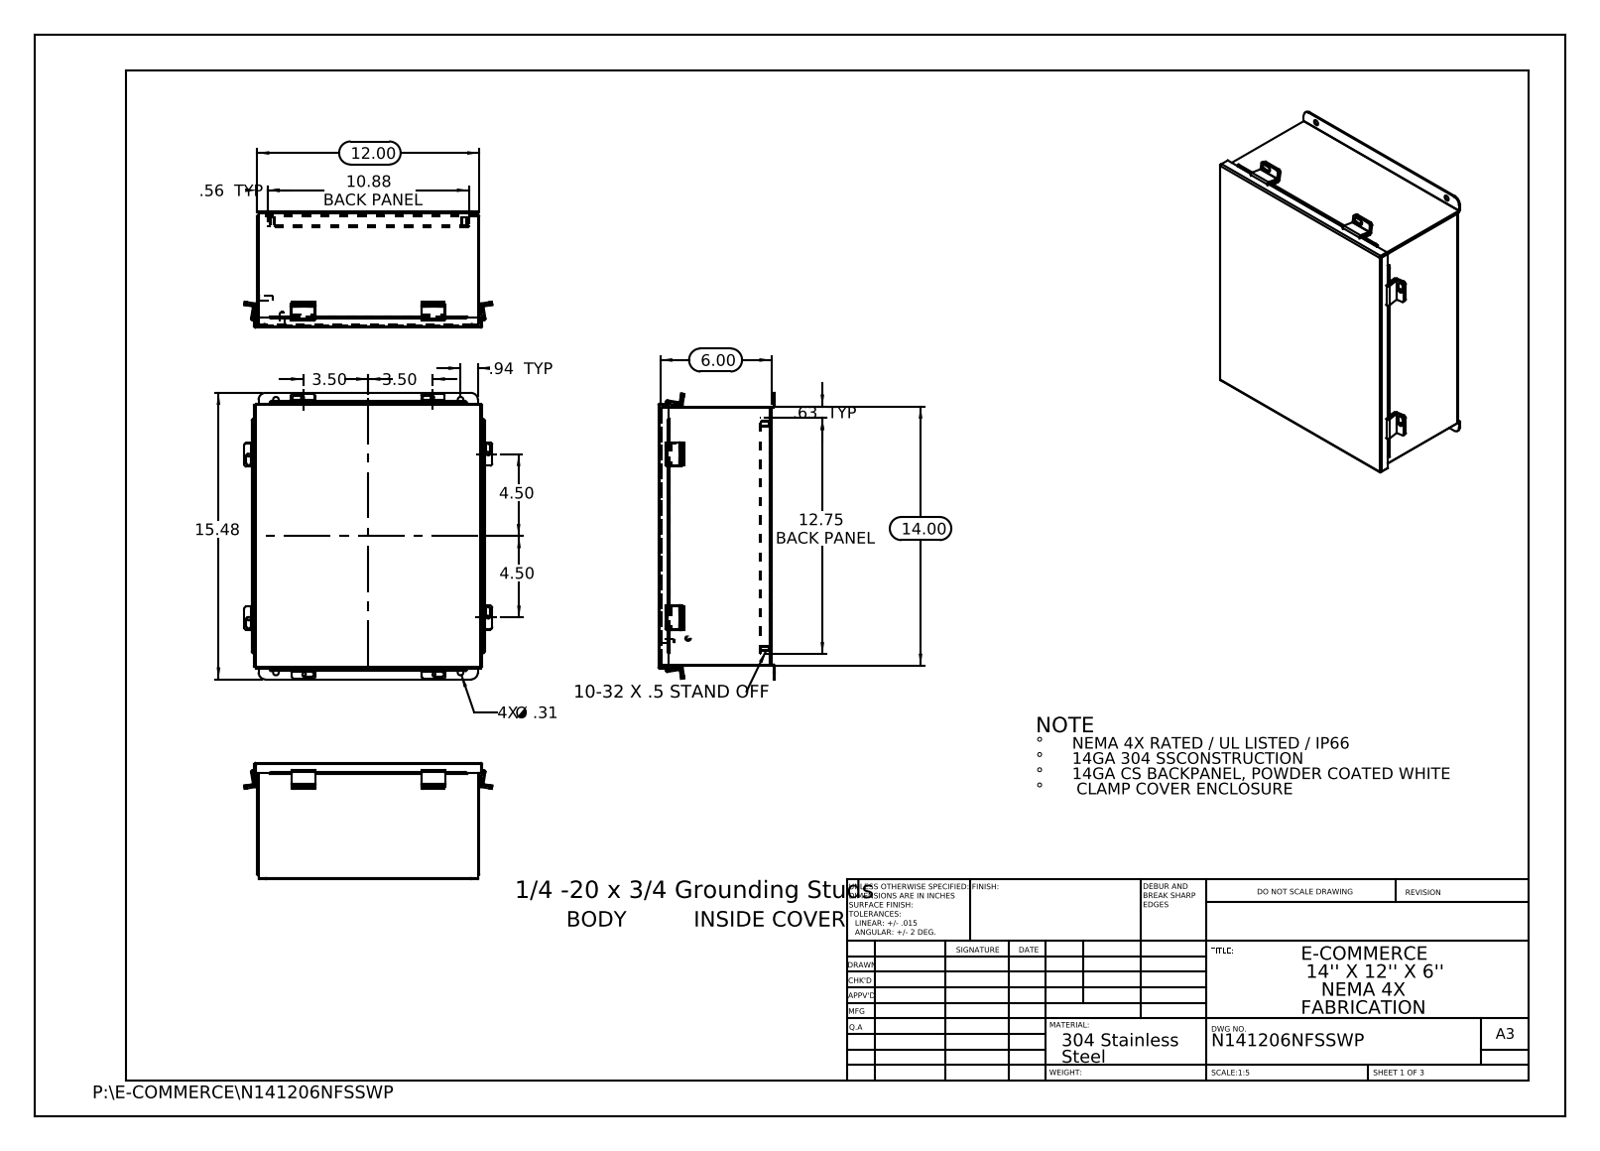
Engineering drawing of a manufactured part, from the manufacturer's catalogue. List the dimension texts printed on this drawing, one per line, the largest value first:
15.48
14.00
12.75 BACK PANEL
12.00
10.88 BACK PANEL
6.00
4.50
4.50
3.50
3.50
.94 TYP
.63 TYP
.56 TYP
4X Ø .31
